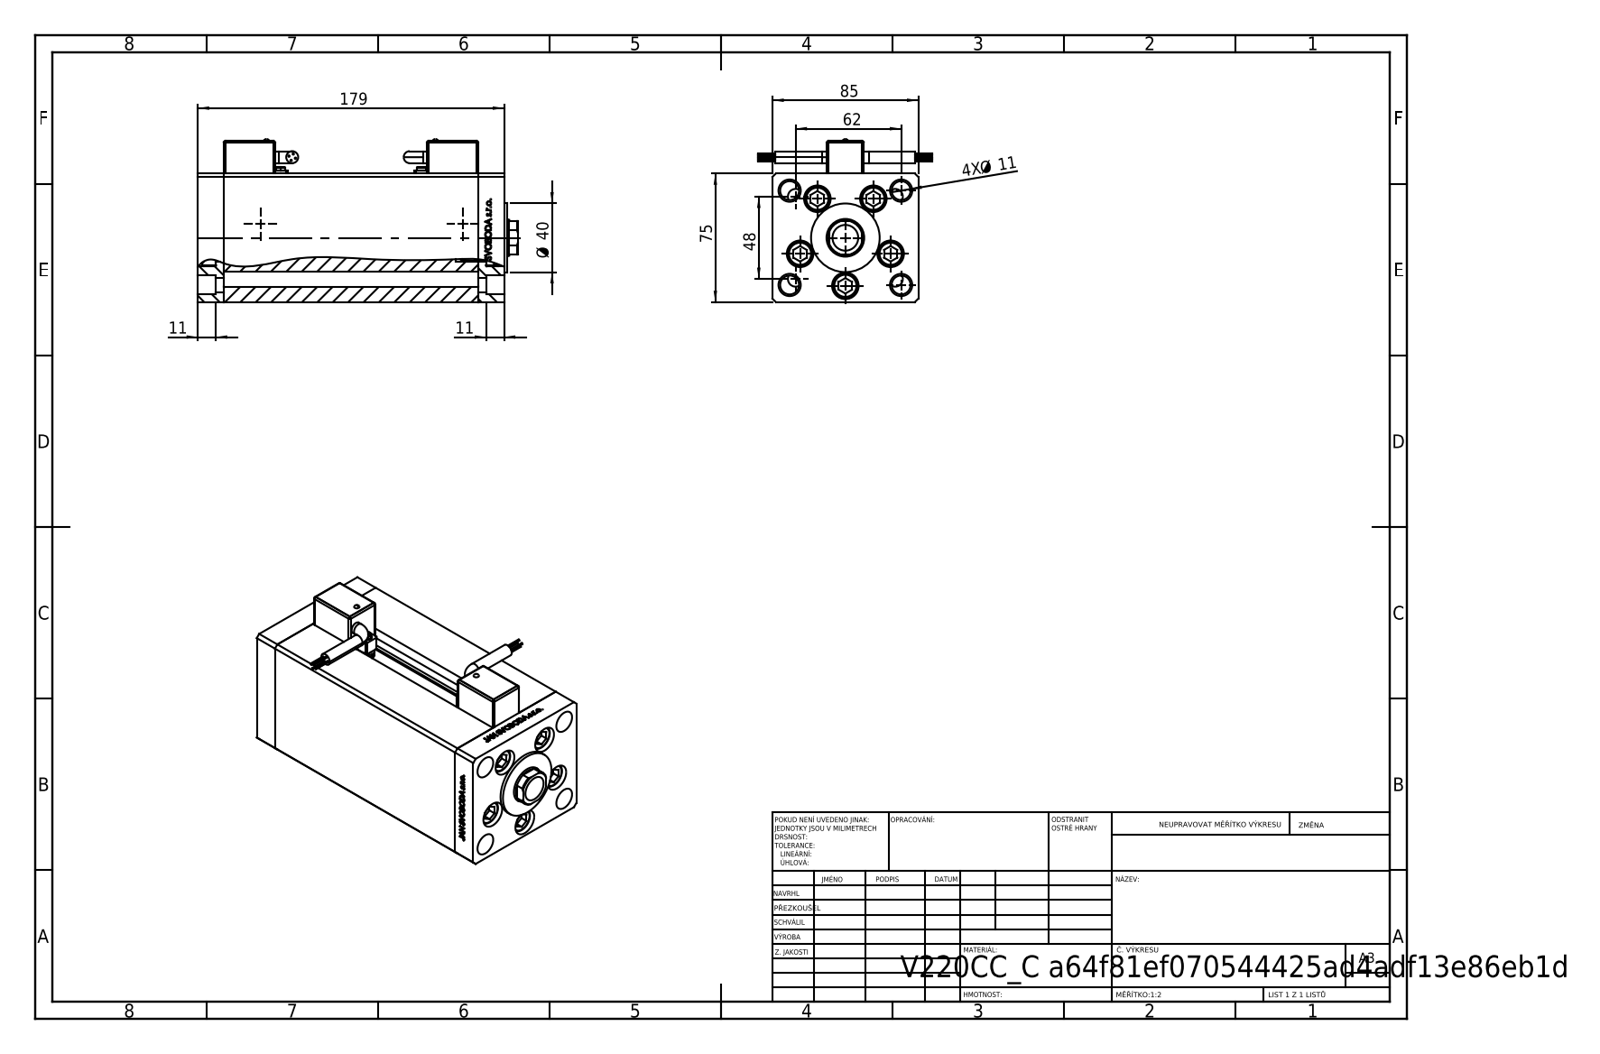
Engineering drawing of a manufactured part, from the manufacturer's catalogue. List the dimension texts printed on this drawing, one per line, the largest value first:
179
85
75
62
48
Ø 40
11
11
4X Ø 11
